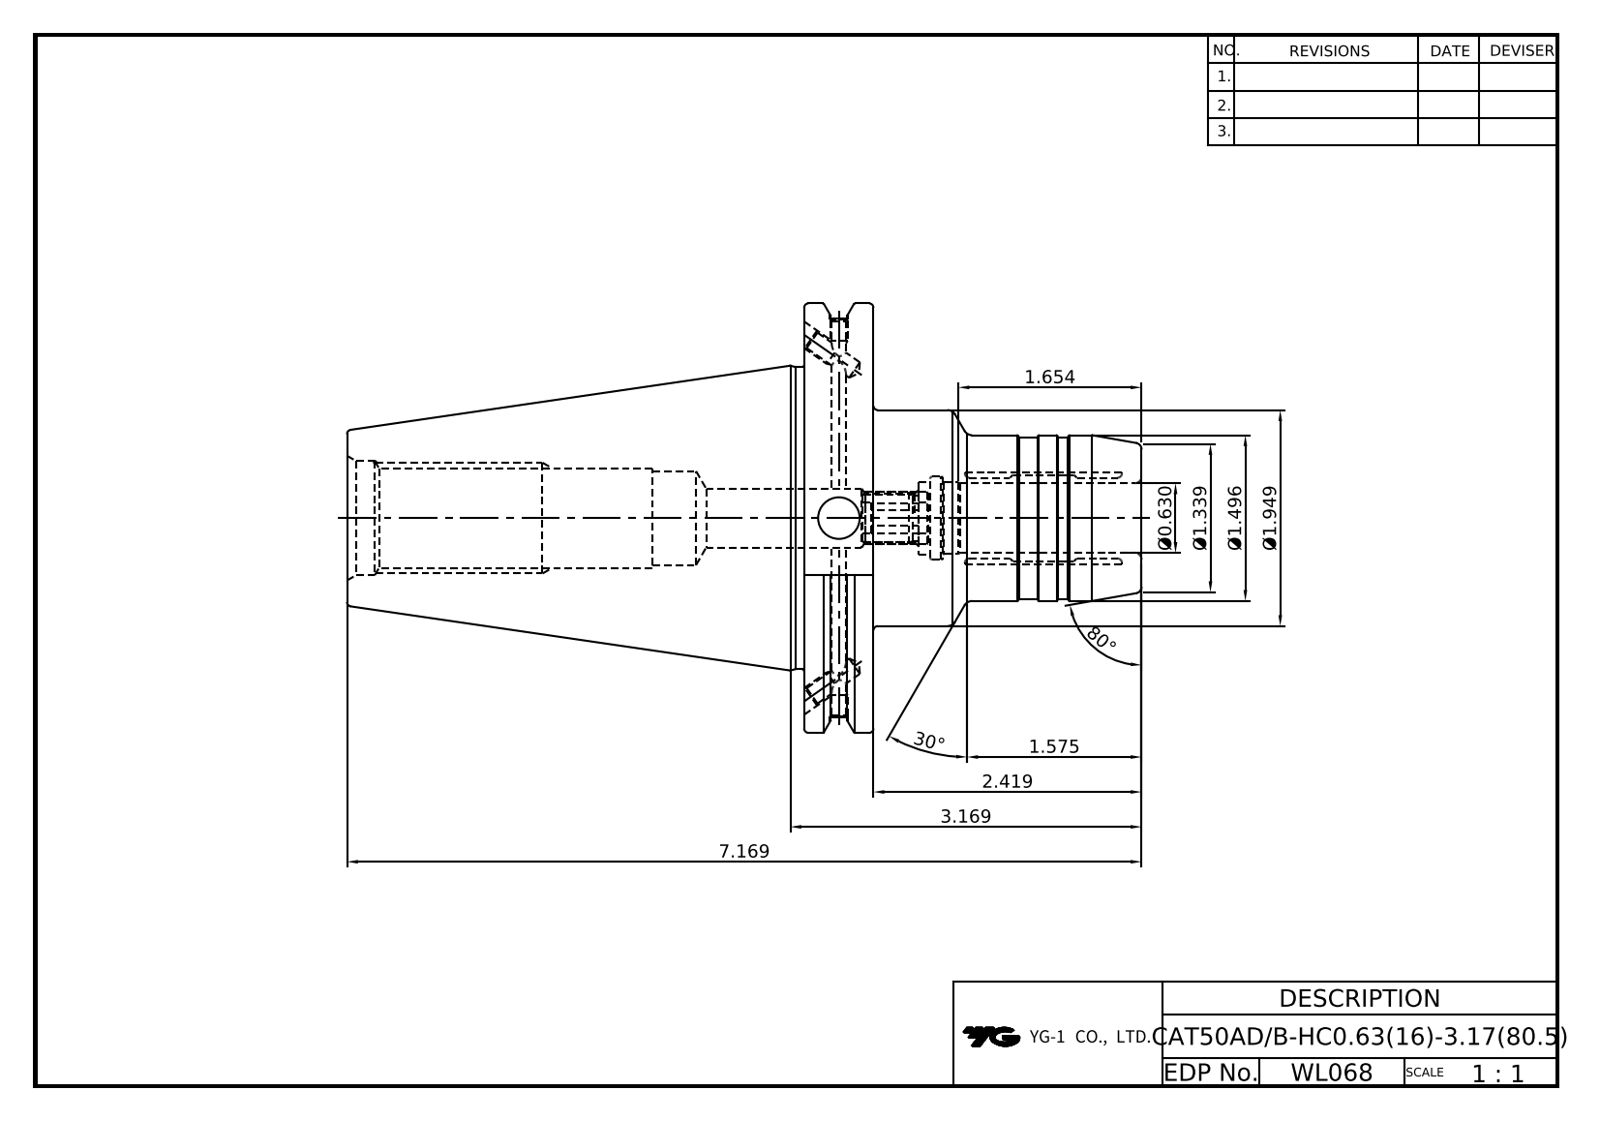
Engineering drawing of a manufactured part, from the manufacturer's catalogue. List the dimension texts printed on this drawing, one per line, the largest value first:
80°
30°
7.169
3.169
2.419
Ø1.949
1.654
1.575
Ø1.496
Ø1.339
Ø0.630
